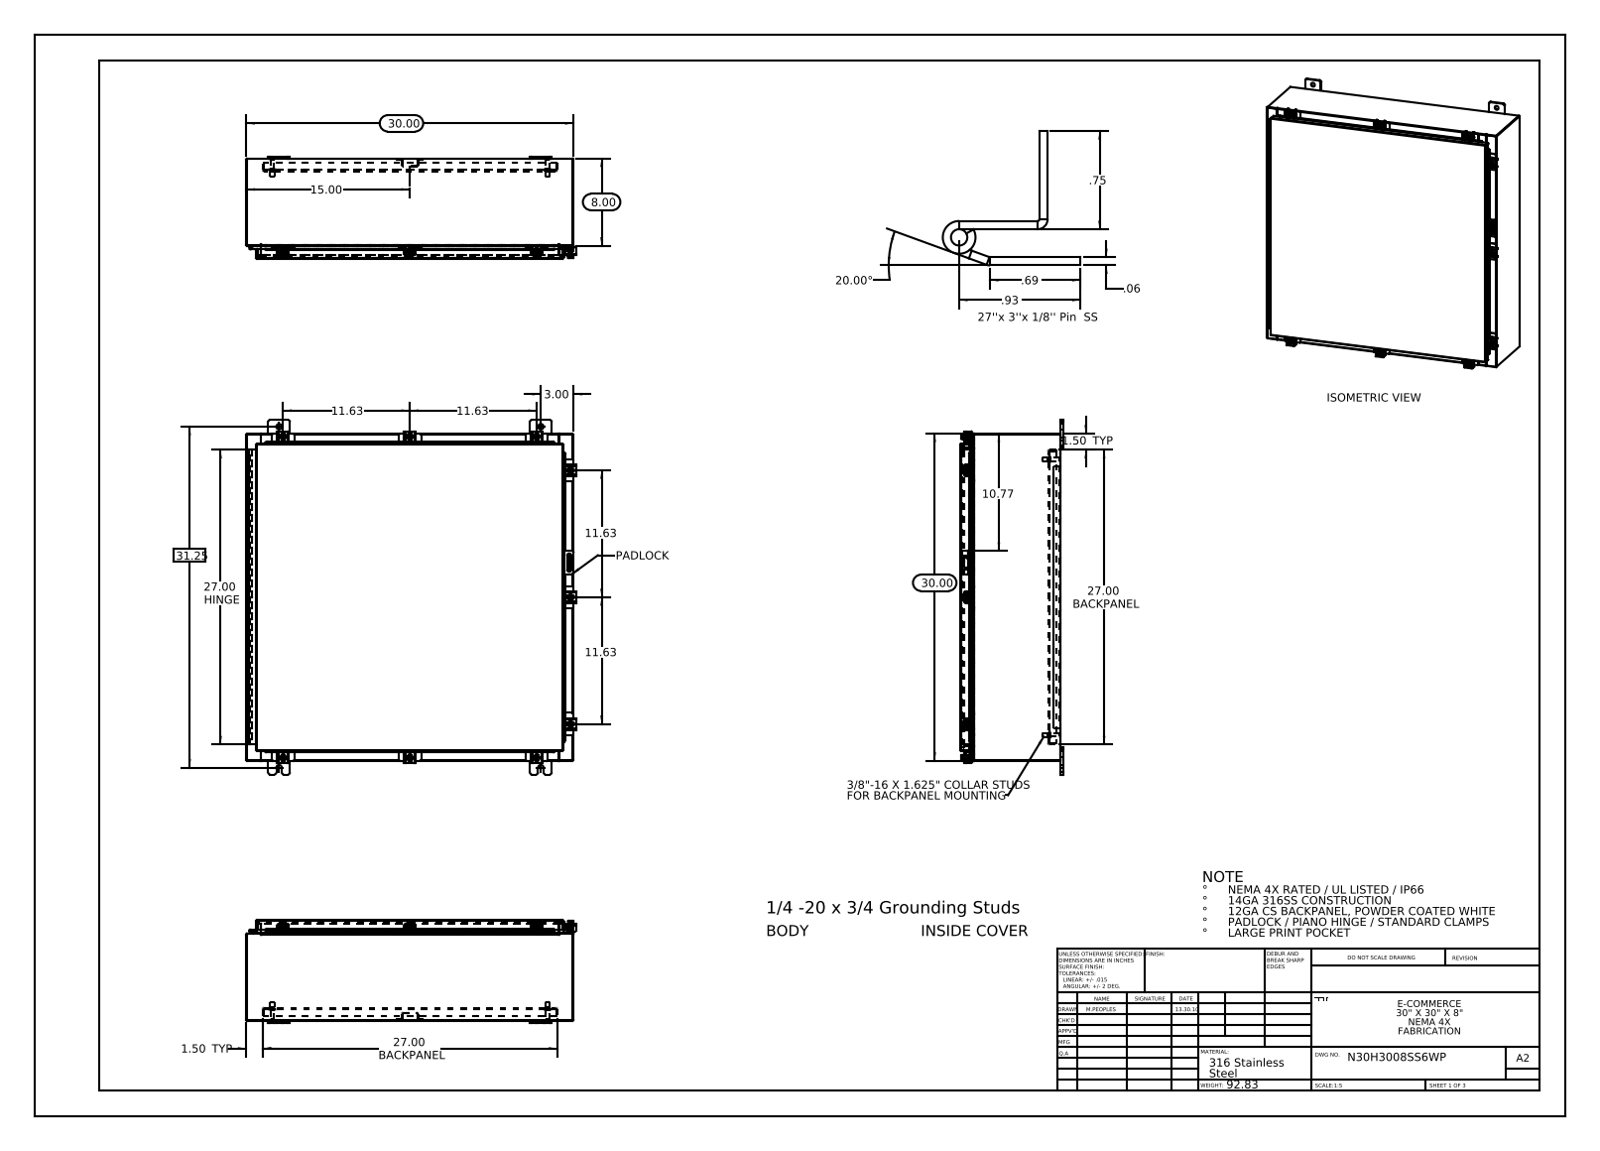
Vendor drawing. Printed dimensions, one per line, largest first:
31.25
30.00
30.00
27.00 HINGE
27.00 BACKPANEL
27.00 BACKPANEL
20.00°
15.00
11.63
11.63
11.63
11.63
10.77
8.00
3.00
1.50 TYP
1.50 TYP
.93
.75
.69
.06
